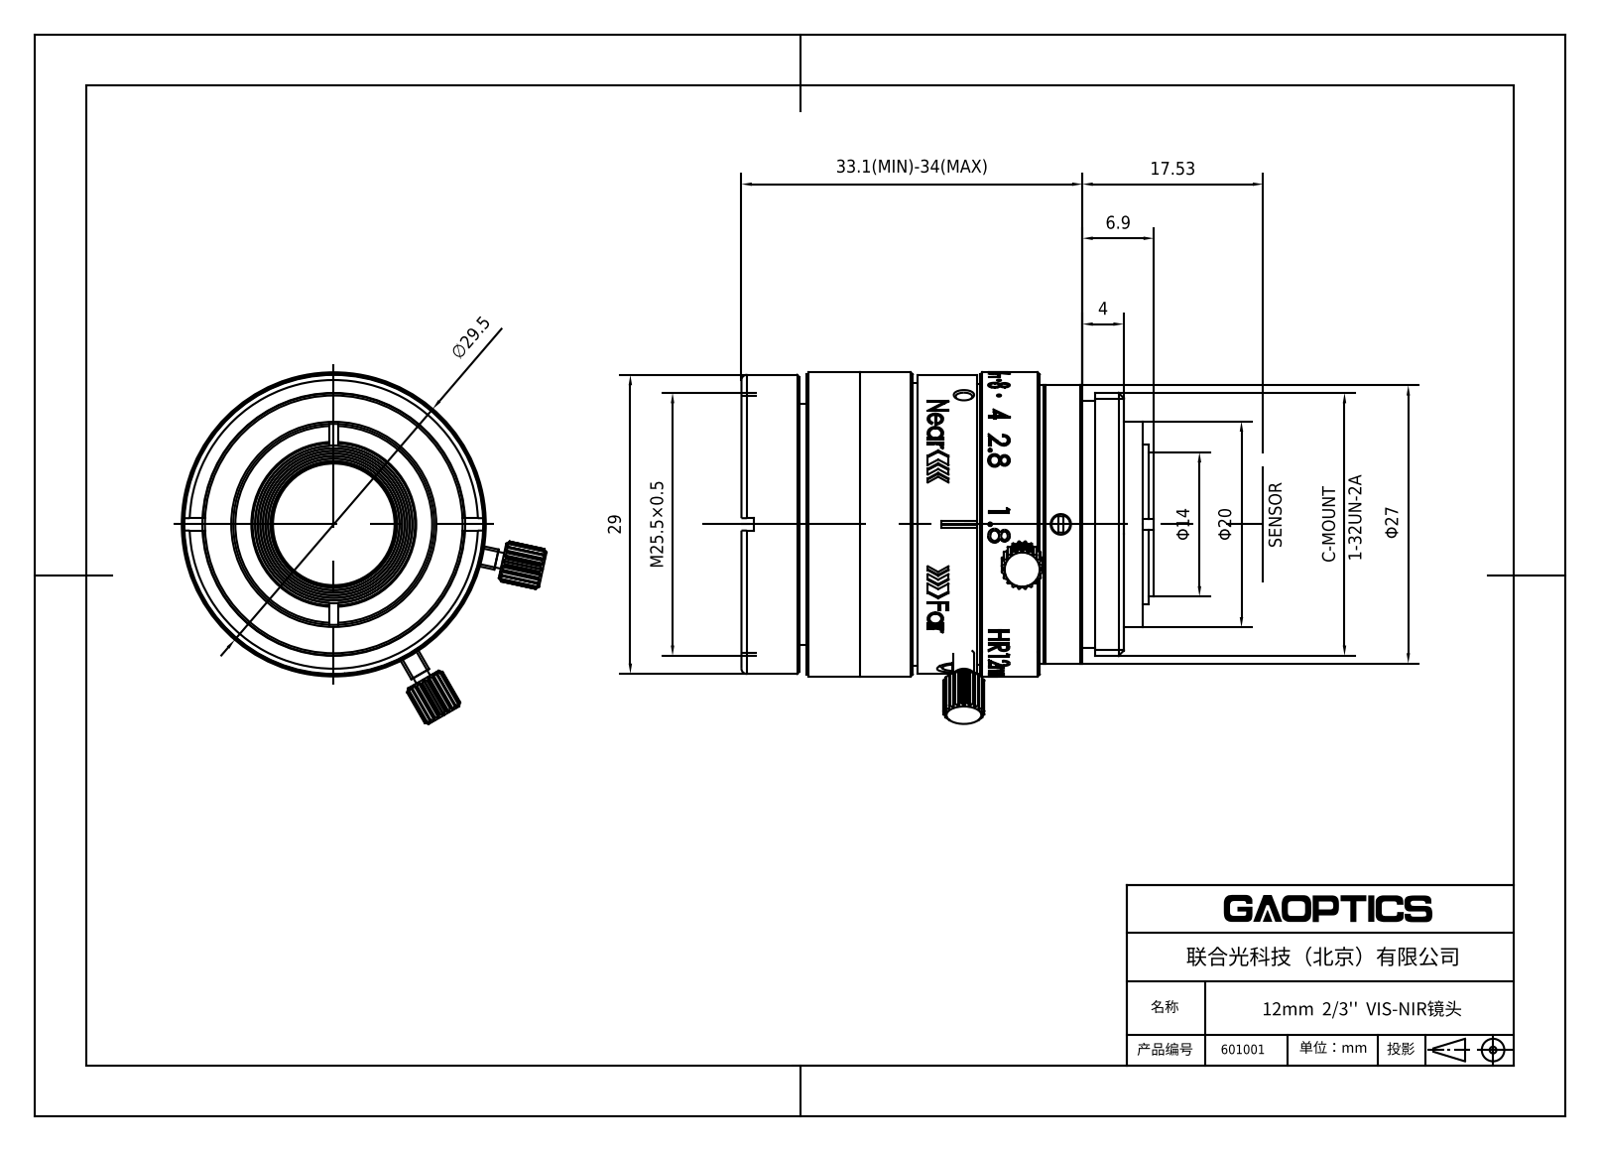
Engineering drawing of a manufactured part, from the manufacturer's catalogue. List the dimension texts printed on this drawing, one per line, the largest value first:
33.1(MIN)-34(MAX)
∅29.5
29
Φ27
M25.5×0.5
Φ20
17.53
Φ14
6.9
4
C-MOUNT
